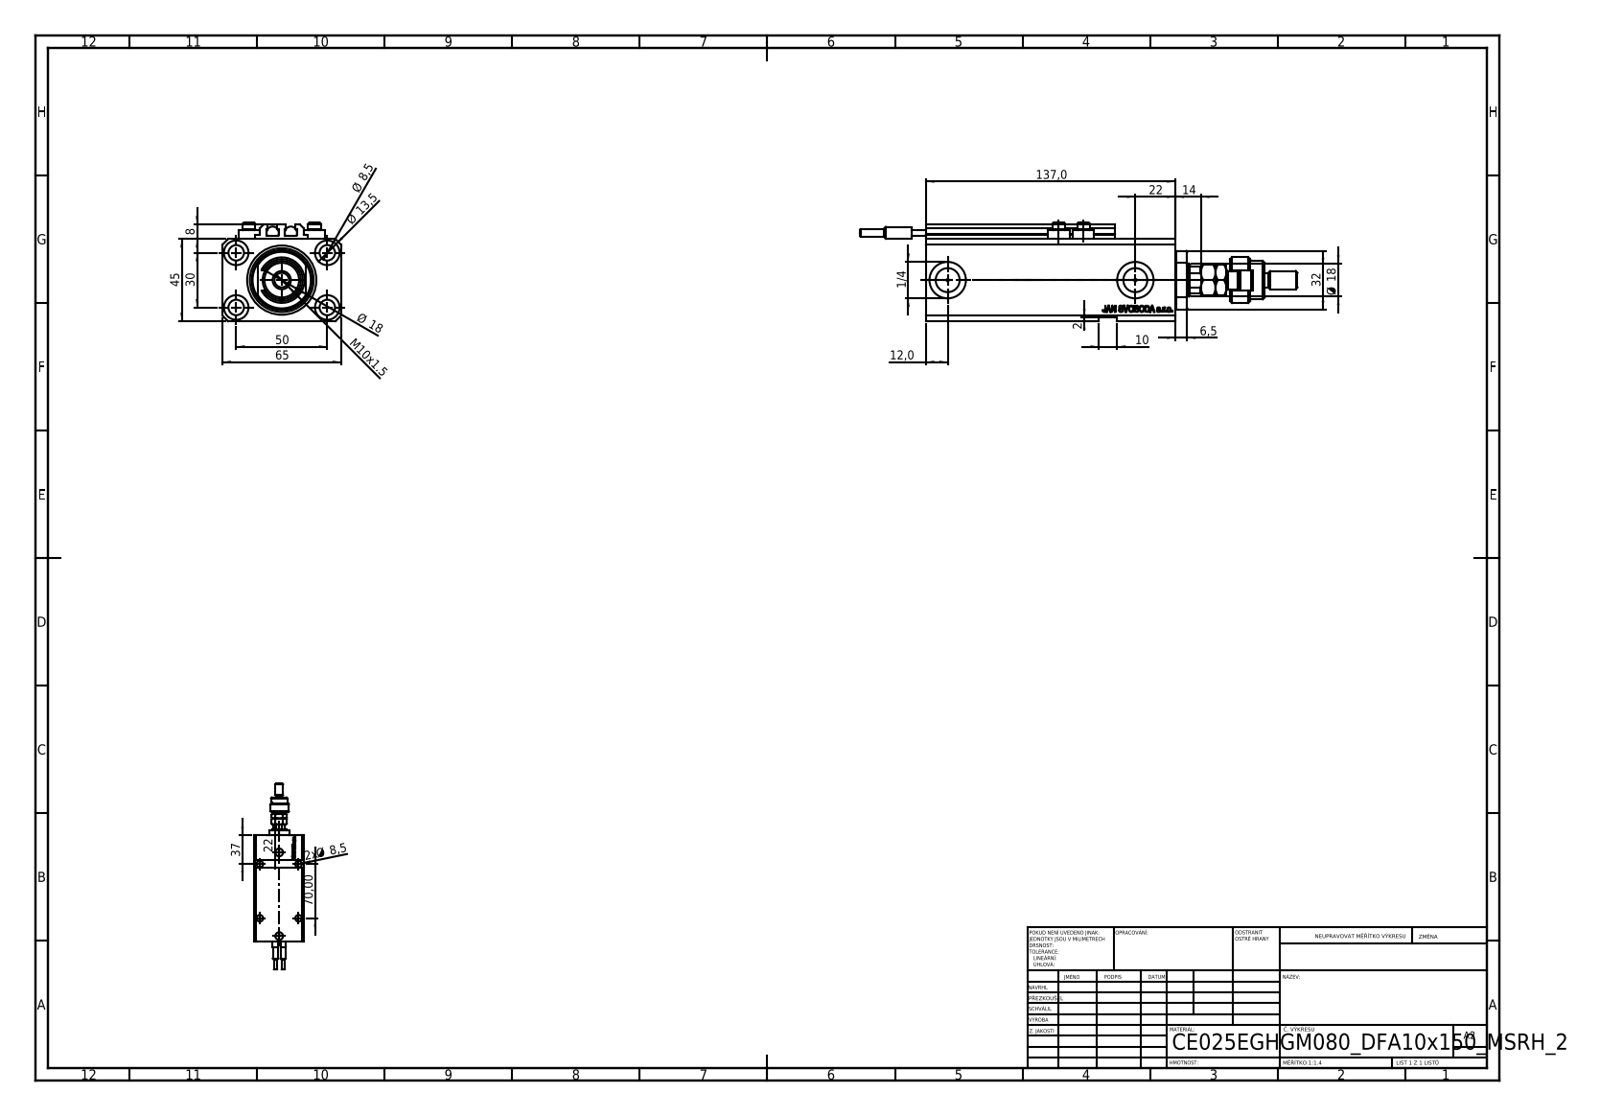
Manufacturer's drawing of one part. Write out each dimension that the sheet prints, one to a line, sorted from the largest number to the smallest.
137,0
70,00
65
50
45
37
32
30
22
22
Ø 18
Ø 18
14
Ø 13,5
12,0
M10x1.5
10
Ø 8,5
2x Ø 8,5
8
6,5
2
1/4
